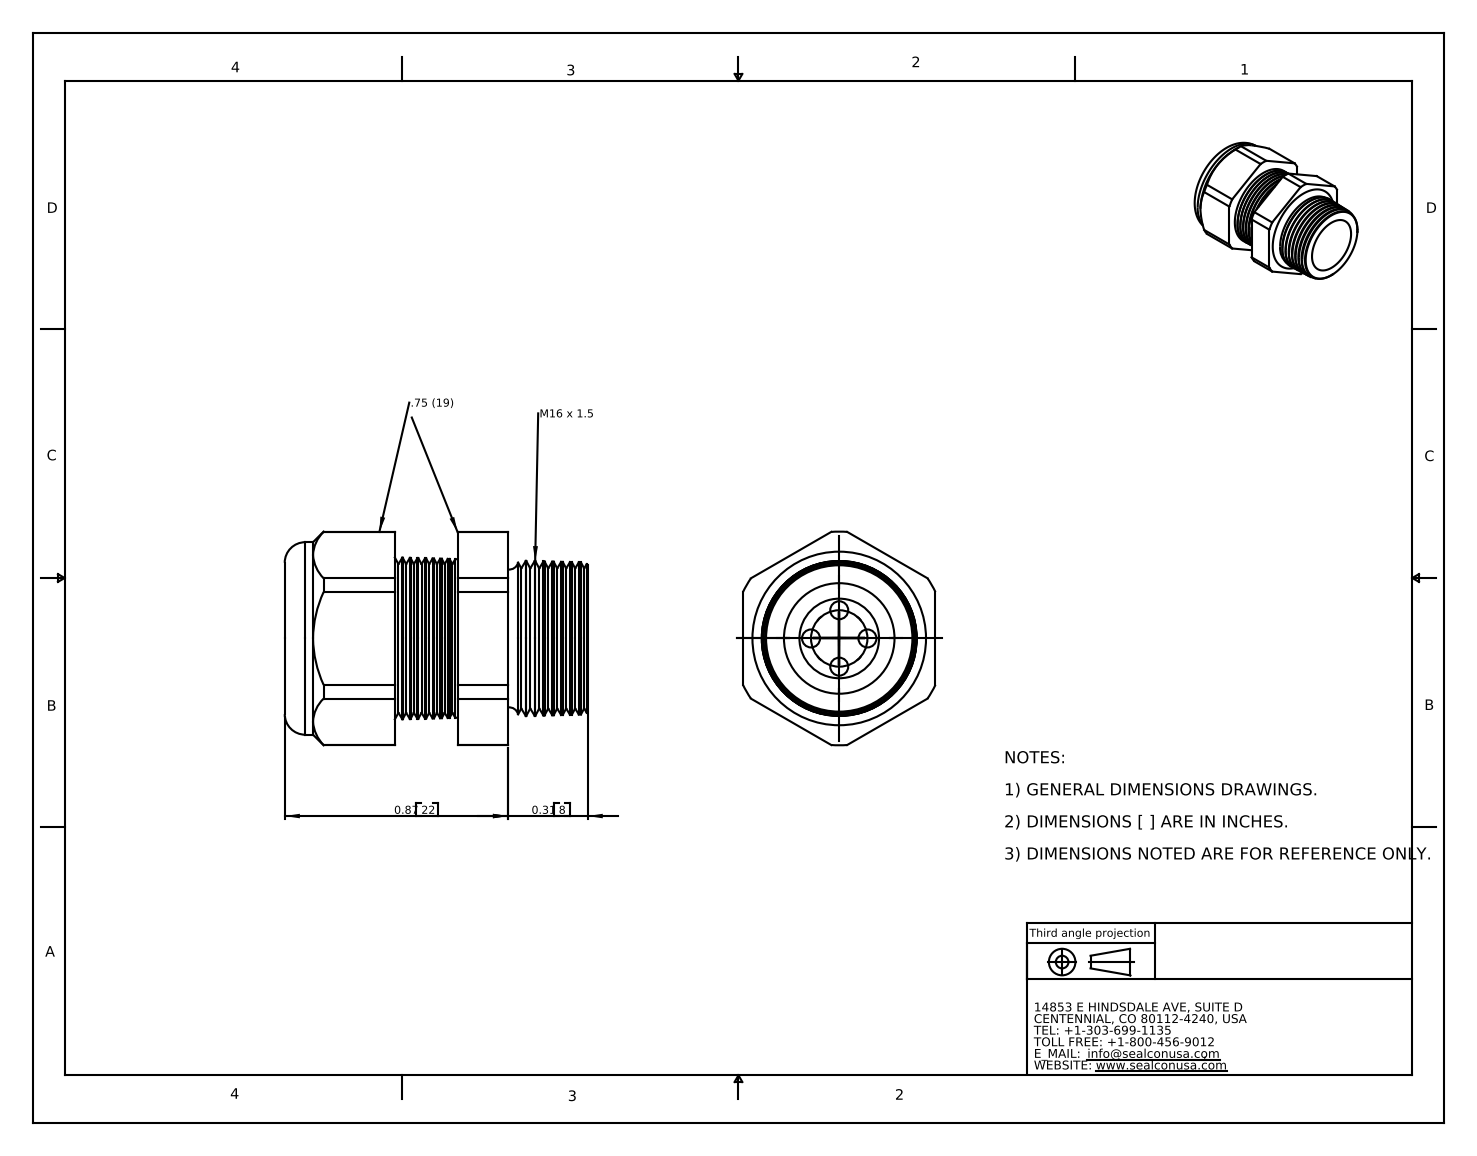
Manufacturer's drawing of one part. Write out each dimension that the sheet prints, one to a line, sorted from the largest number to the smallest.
0.87 22
0.31 8
